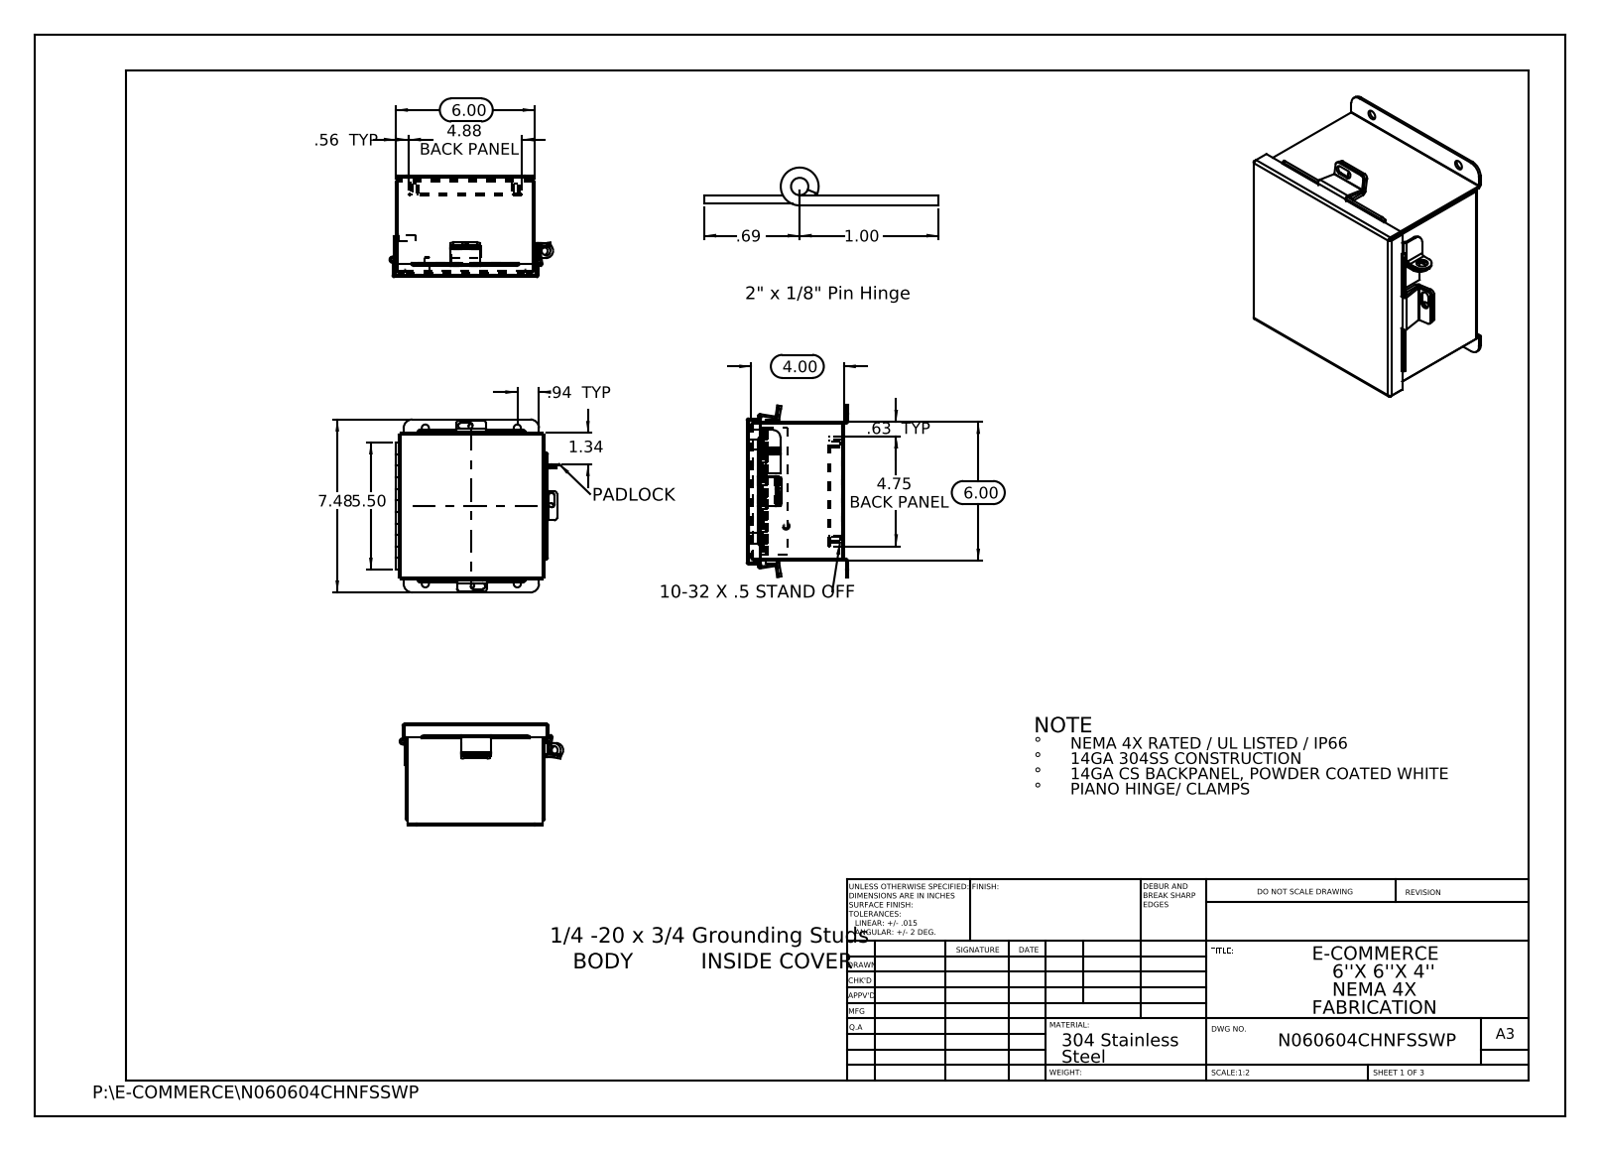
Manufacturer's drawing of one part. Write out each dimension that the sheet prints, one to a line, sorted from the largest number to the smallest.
7.48
6.00
6.00
5.50
4.88 BACK PANEL
4.75 BACK PANEL
4.00
1.34
1.00
.94 TYP
.69
.63 TYP
.56 TYP
